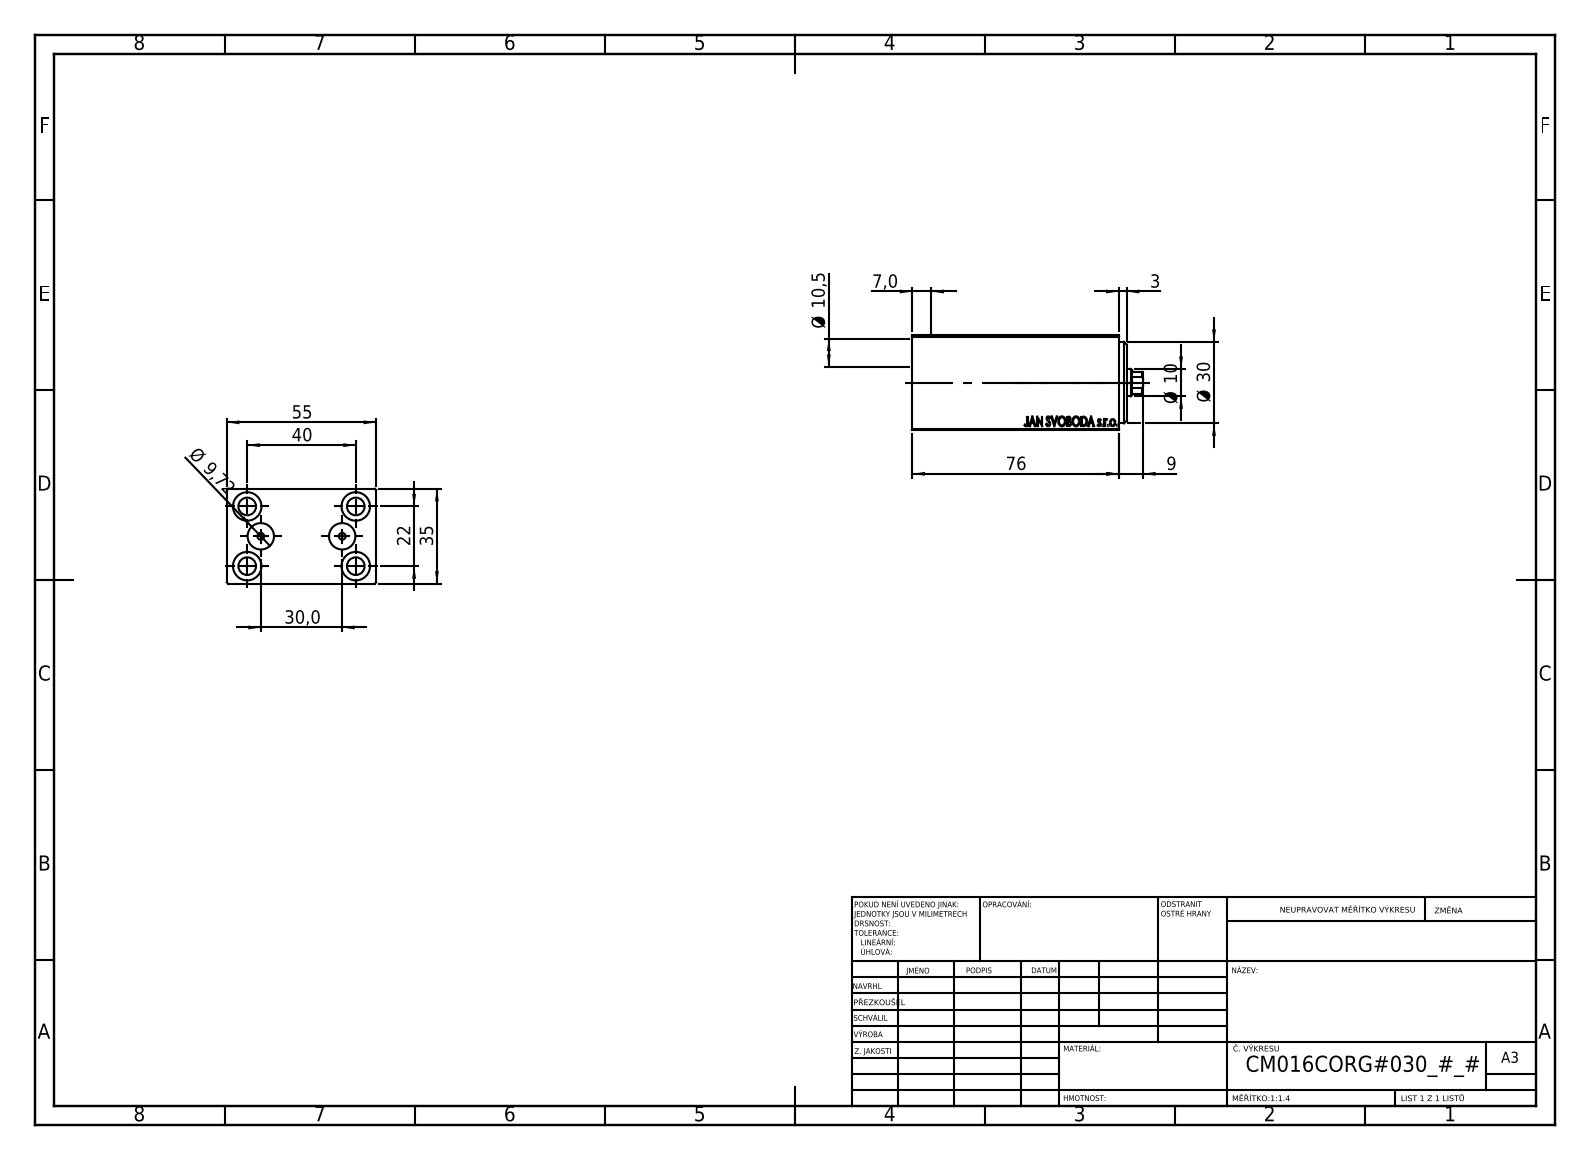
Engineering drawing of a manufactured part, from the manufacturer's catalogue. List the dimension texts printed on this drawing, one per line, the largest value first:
76
55
40
35
Ø 30
30,0
22
Ø 10,5
Ø 10
Ø 9,72
9
7,0
3
